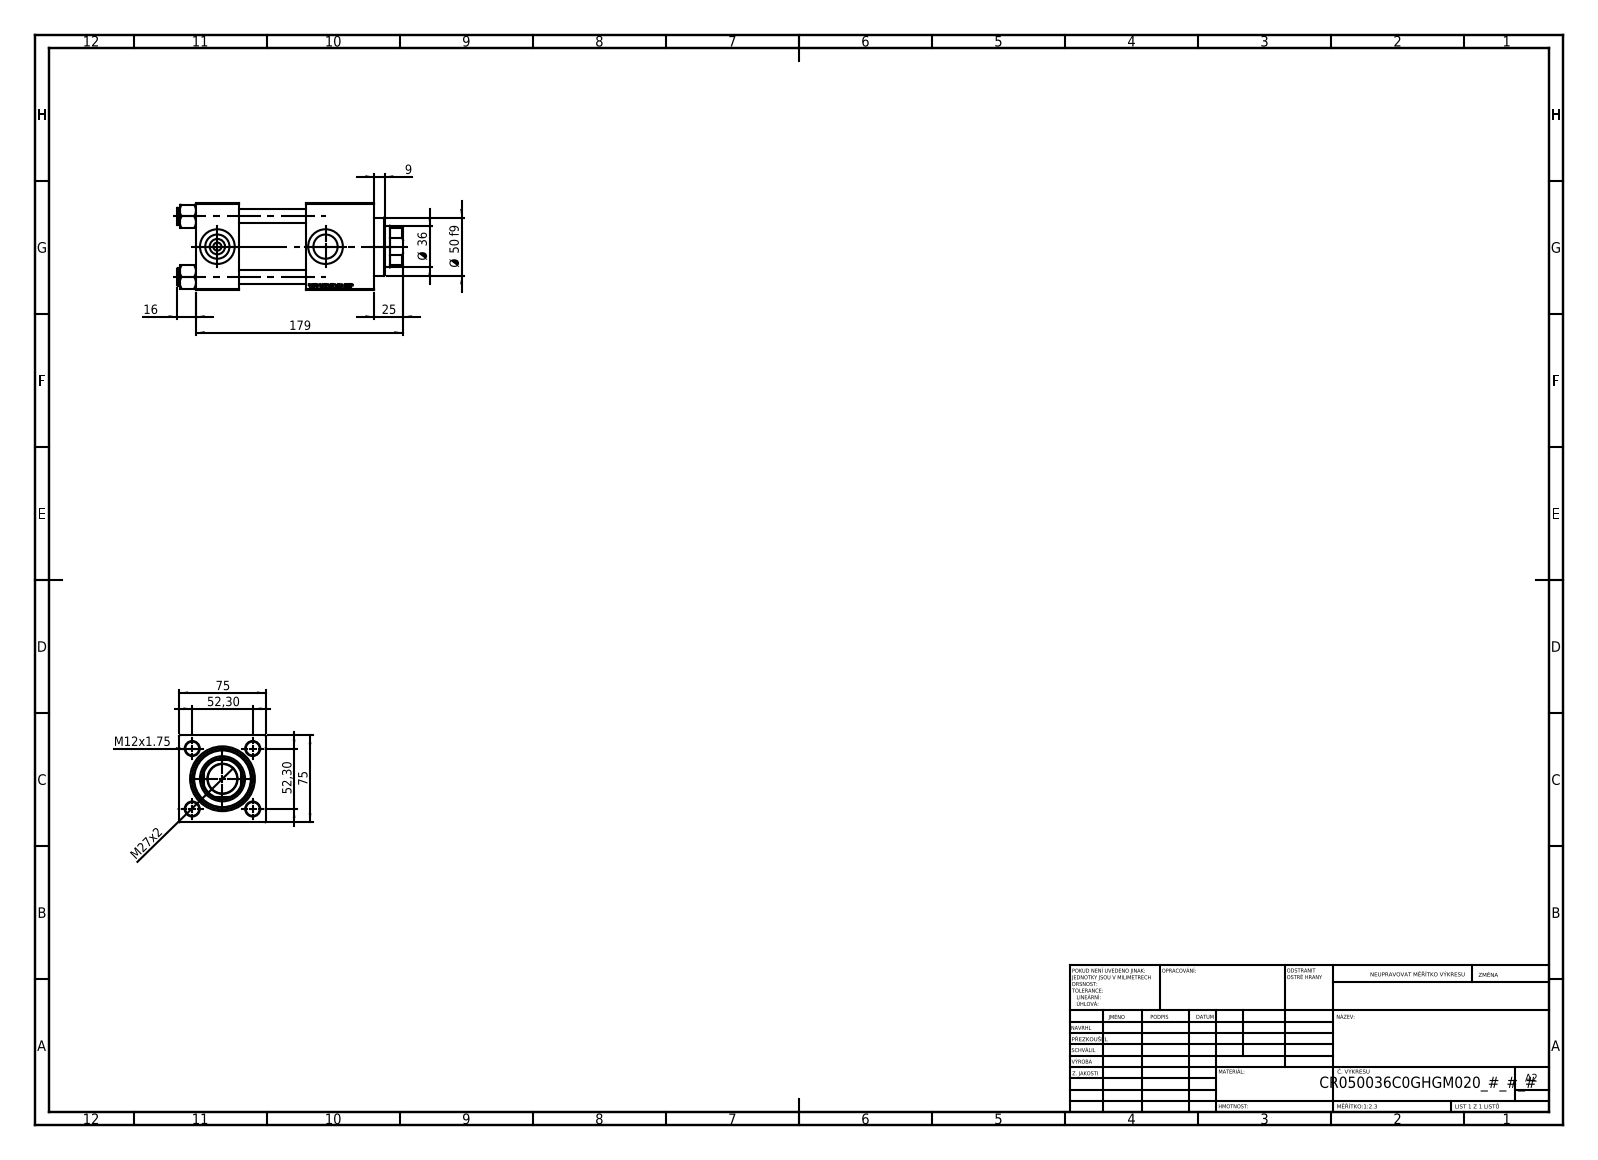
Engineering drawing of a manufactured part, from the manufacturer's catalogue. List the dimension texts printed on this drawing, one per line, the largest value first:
179
75
75
52,30
52,30
Ø 50 f9
Ø 36
M27x2
25
16
M12x1.75
9
